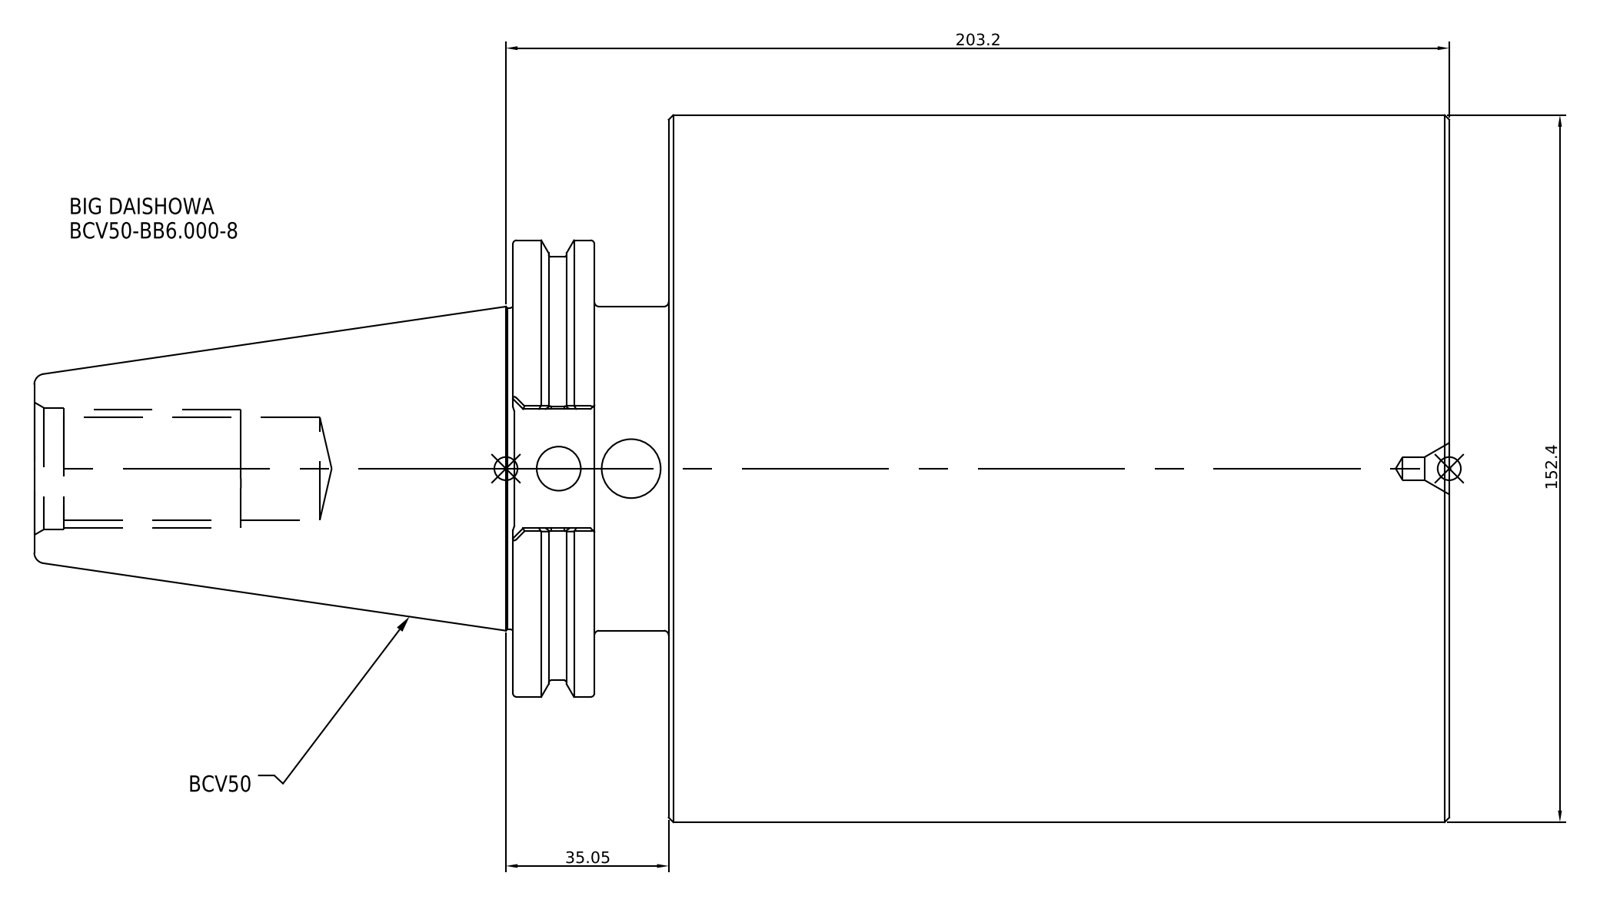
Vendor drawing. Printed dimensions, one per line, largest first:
203.2
152.4
35.05
